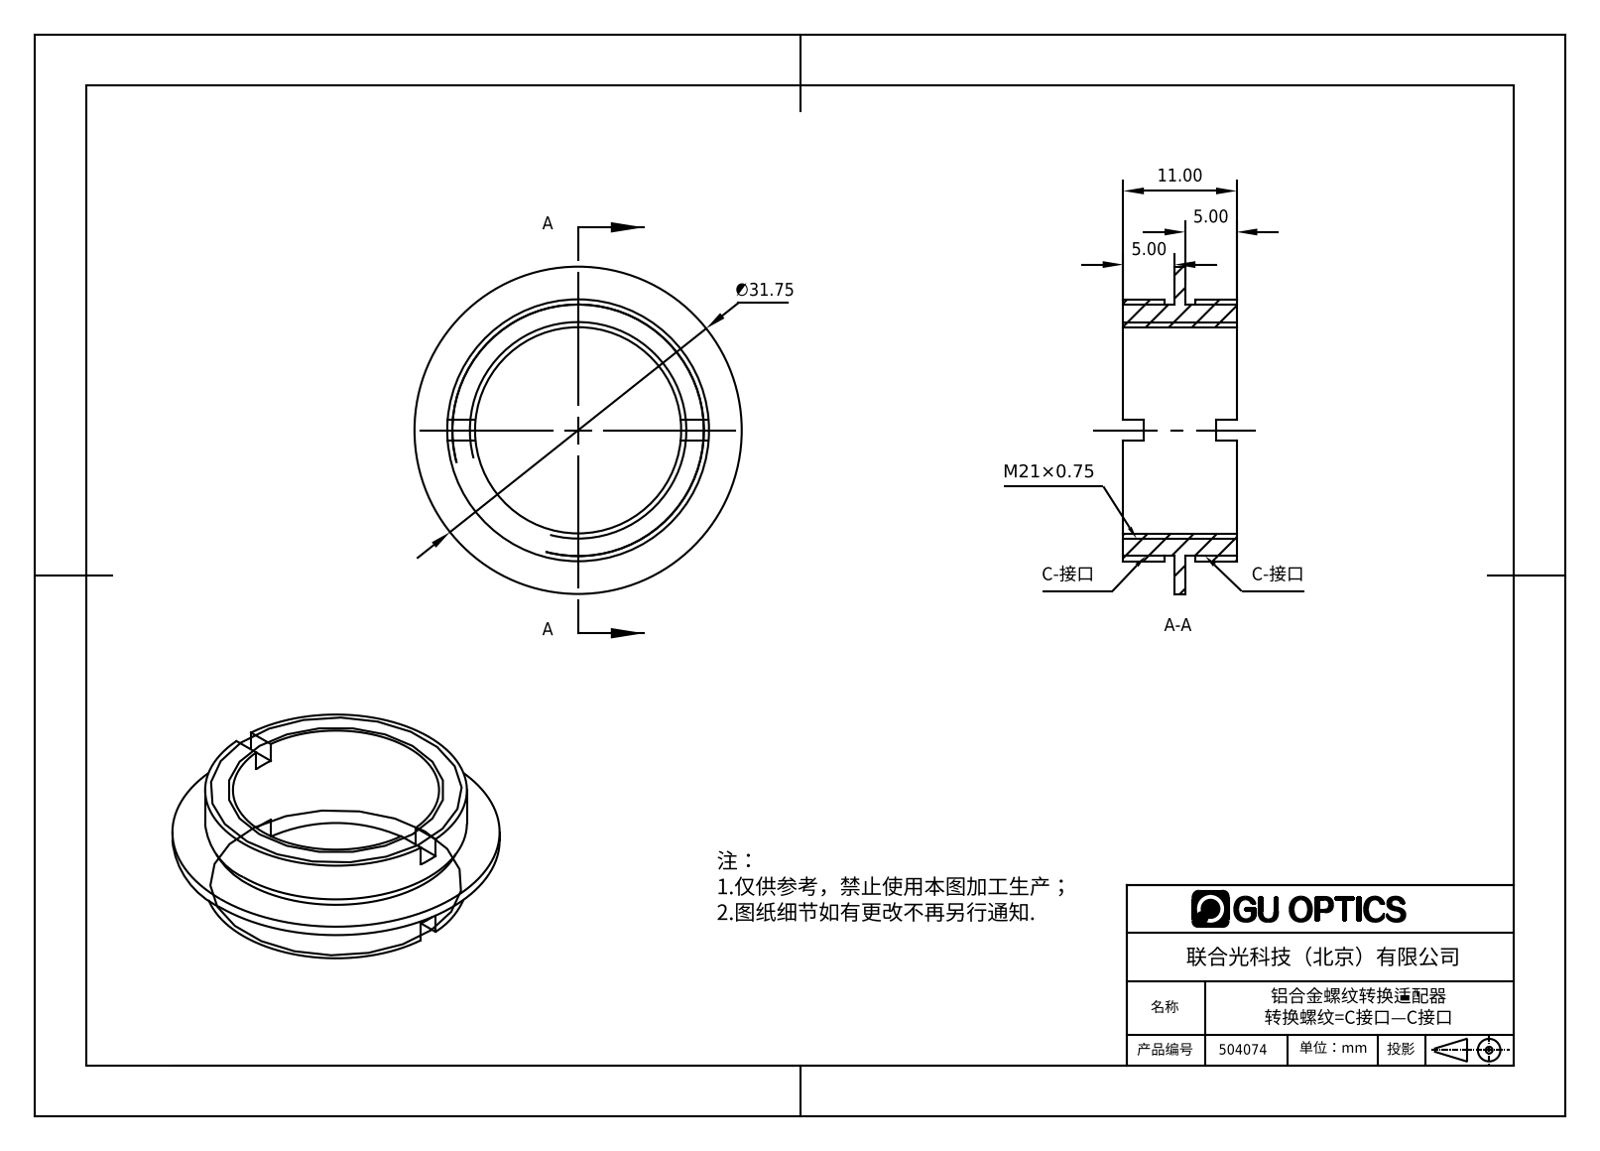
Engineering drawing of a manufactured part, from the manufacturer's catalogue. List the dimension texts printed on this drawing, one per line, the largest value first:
∅31.75
11.00
5.00
5.00
